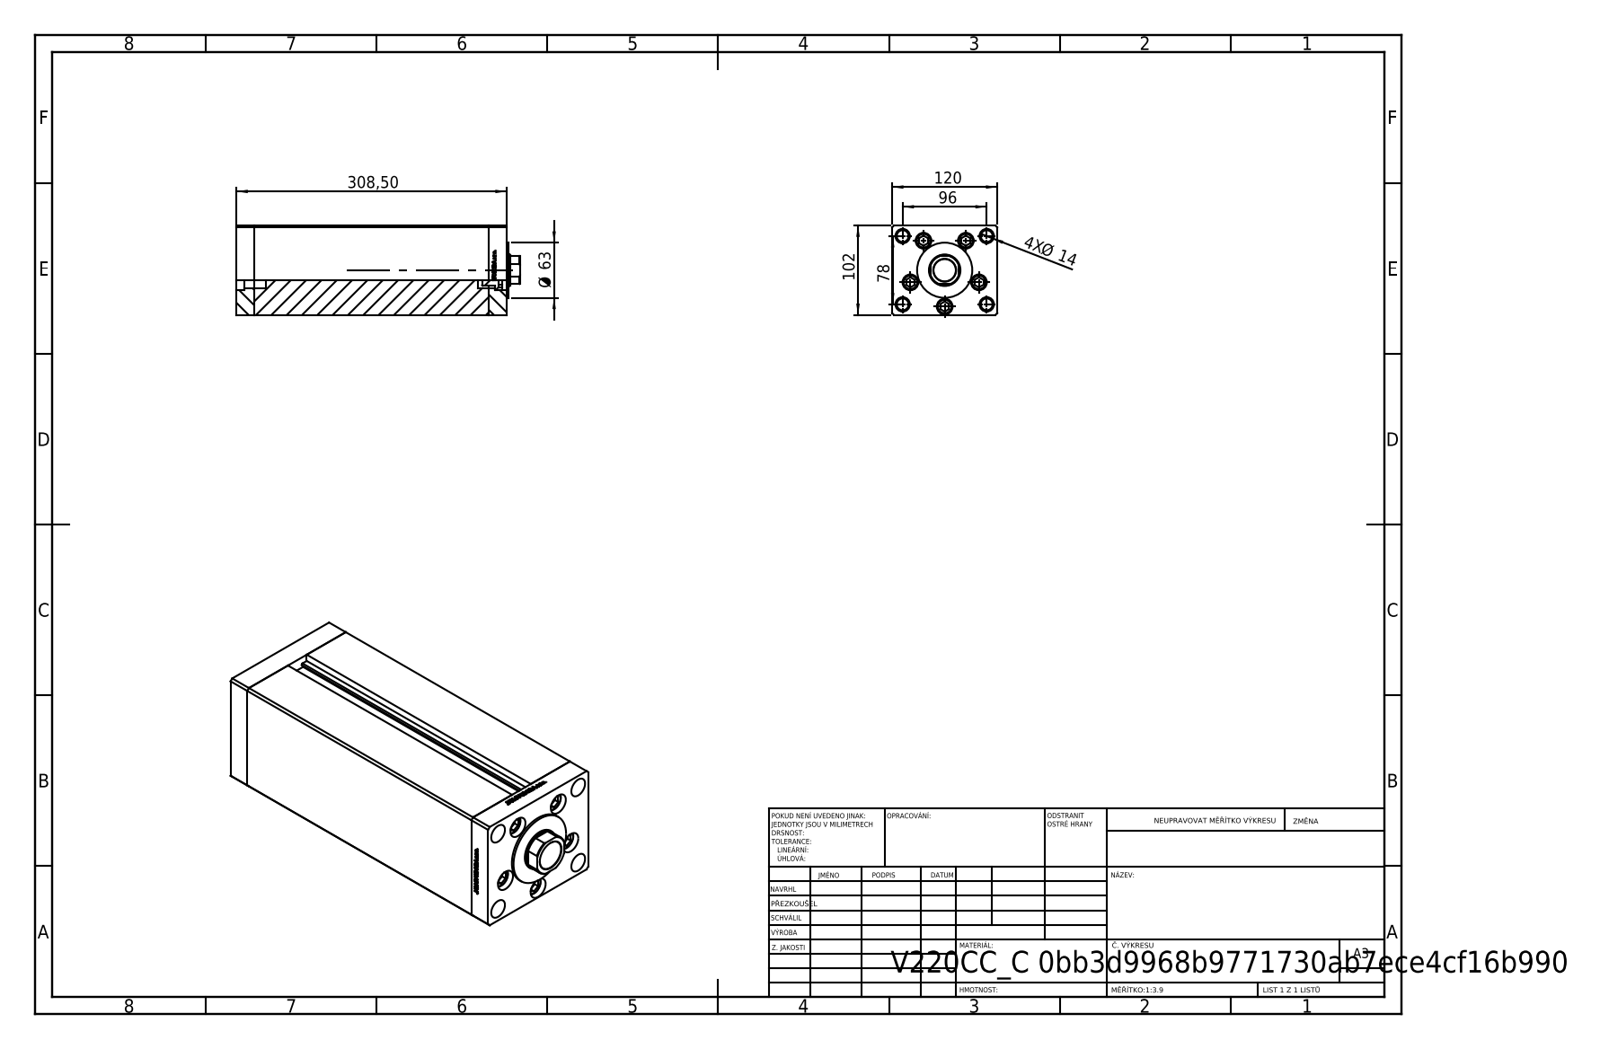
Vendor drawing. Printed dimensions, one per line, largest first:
308,50
120
102
96
78
Ø 63
4X Ø 14
